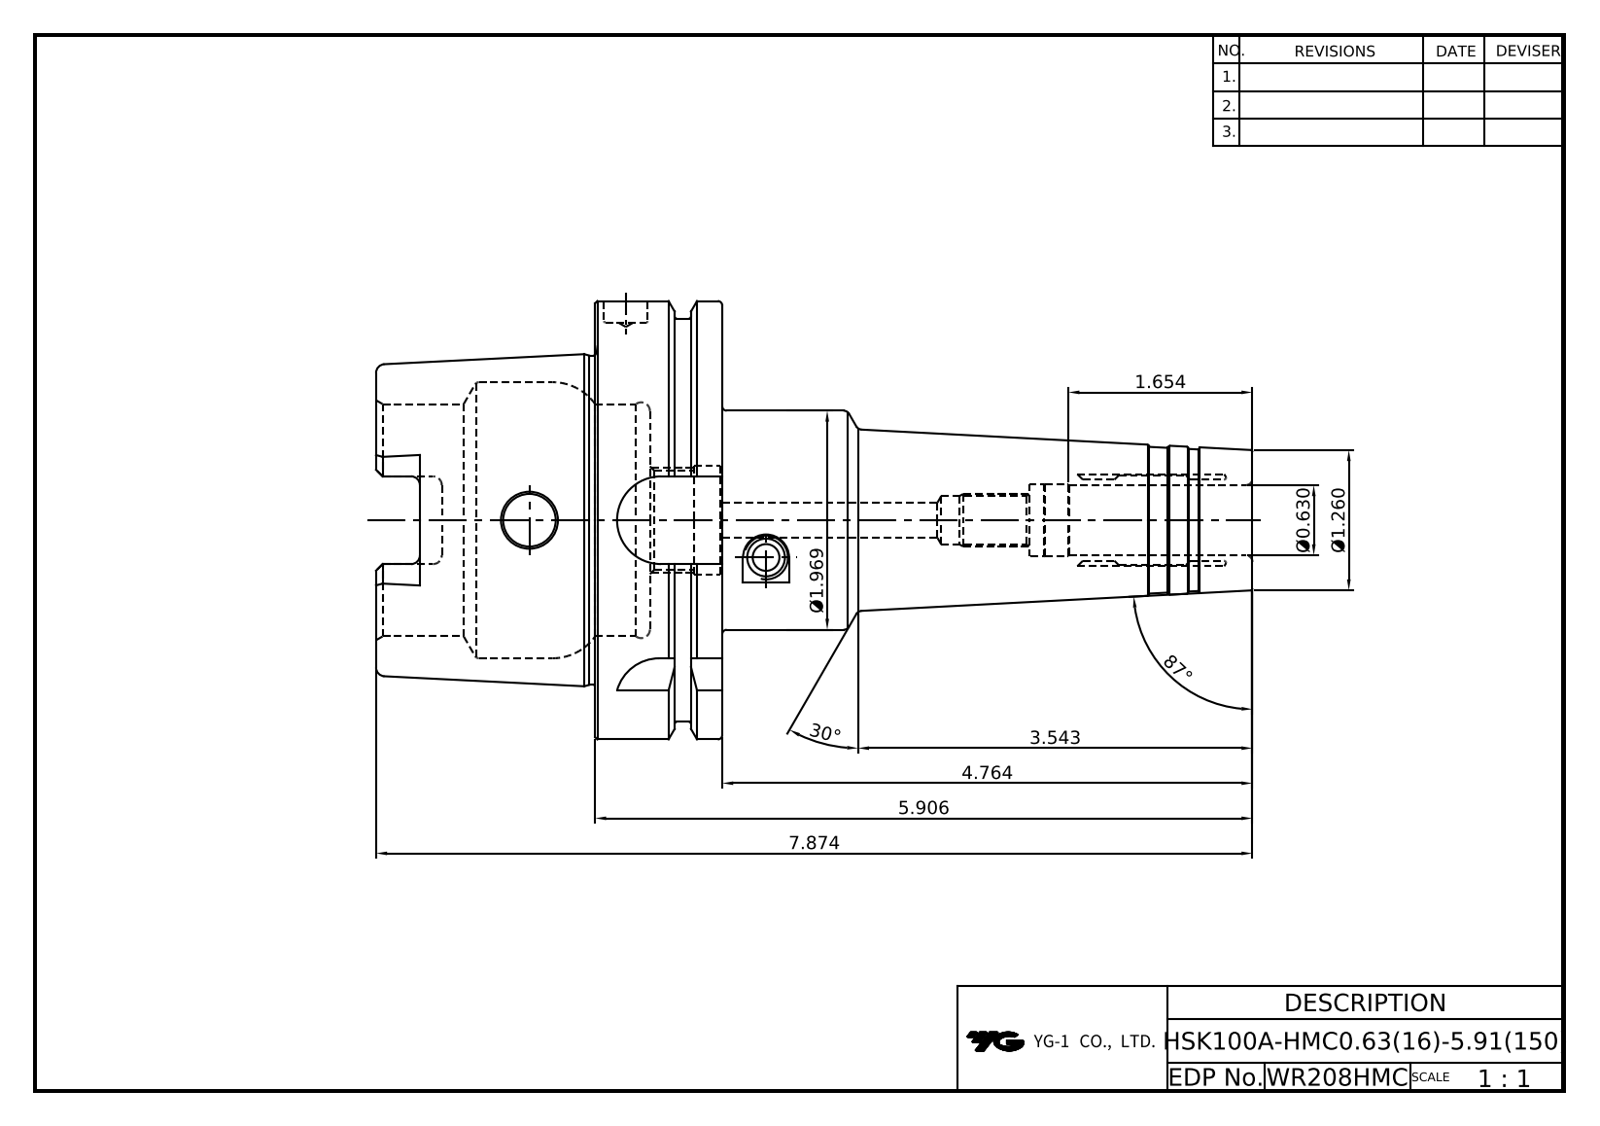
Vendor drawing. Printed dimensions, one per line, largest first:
87°
30°
7.874
5.906
4.764
3.543
Ø1.969
1.654
Ø1.260
Ø0.630
